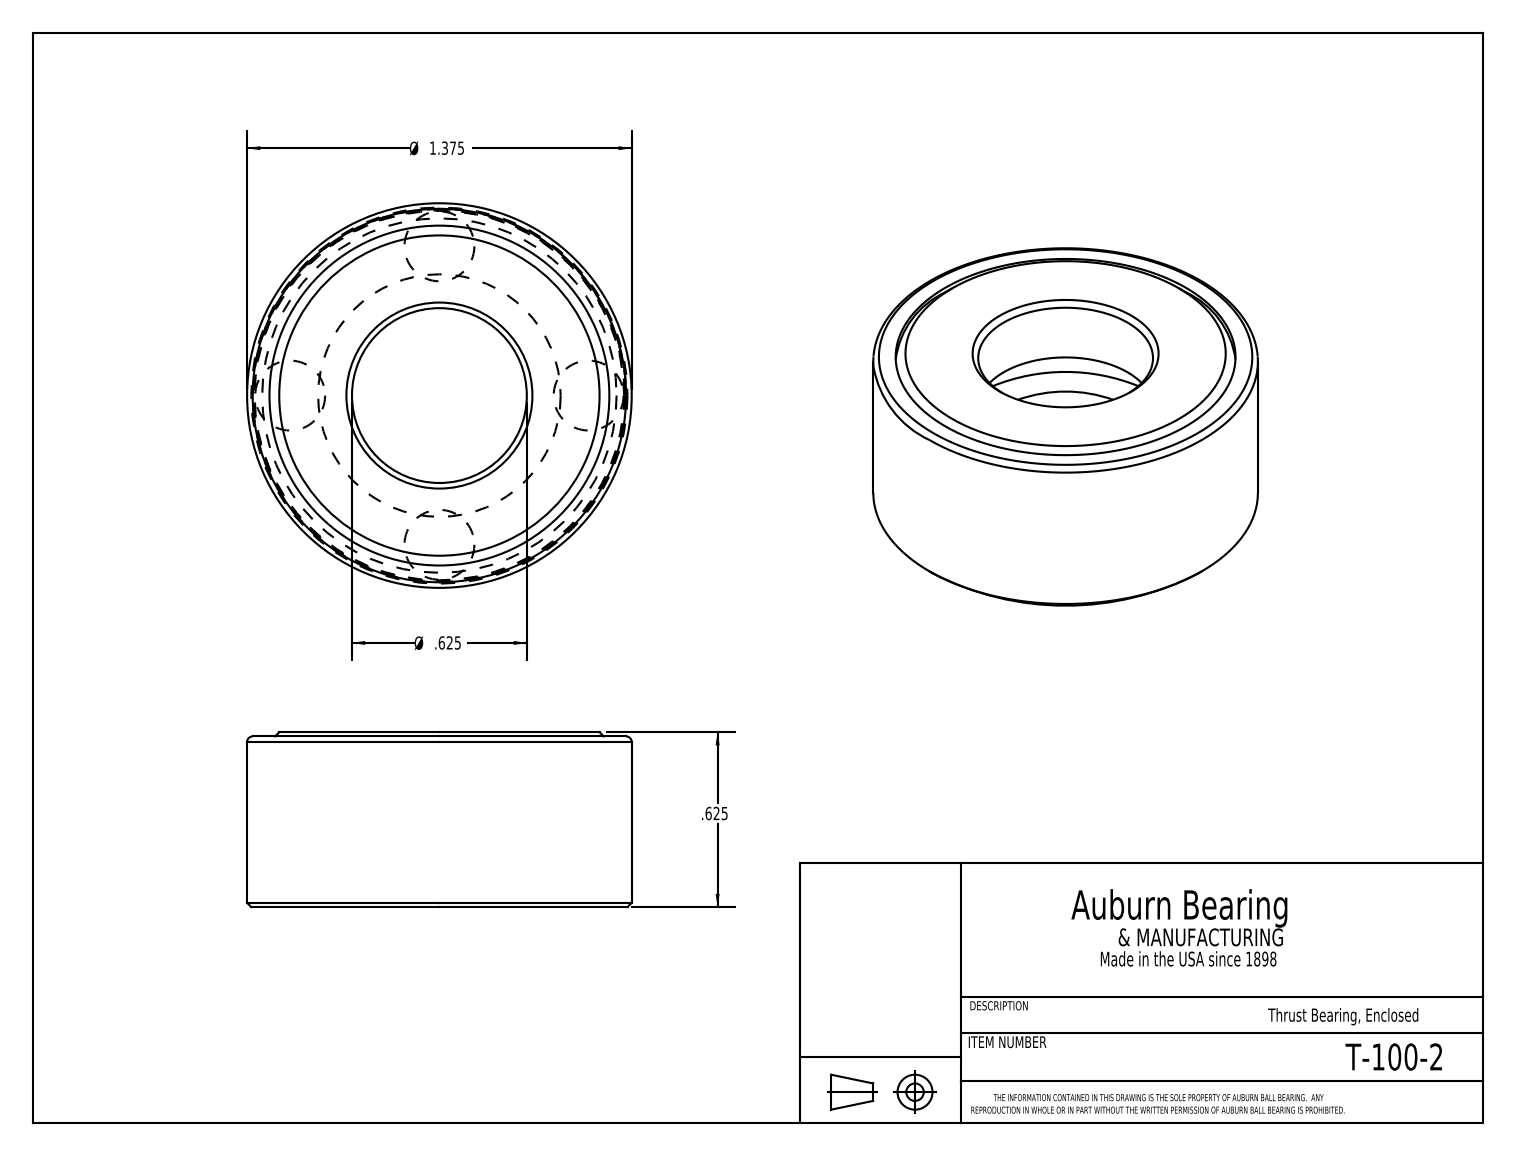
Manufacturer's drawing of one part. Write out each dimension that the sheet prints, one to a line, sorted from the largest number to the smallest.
Ø 1.375
.625
Ø .625
